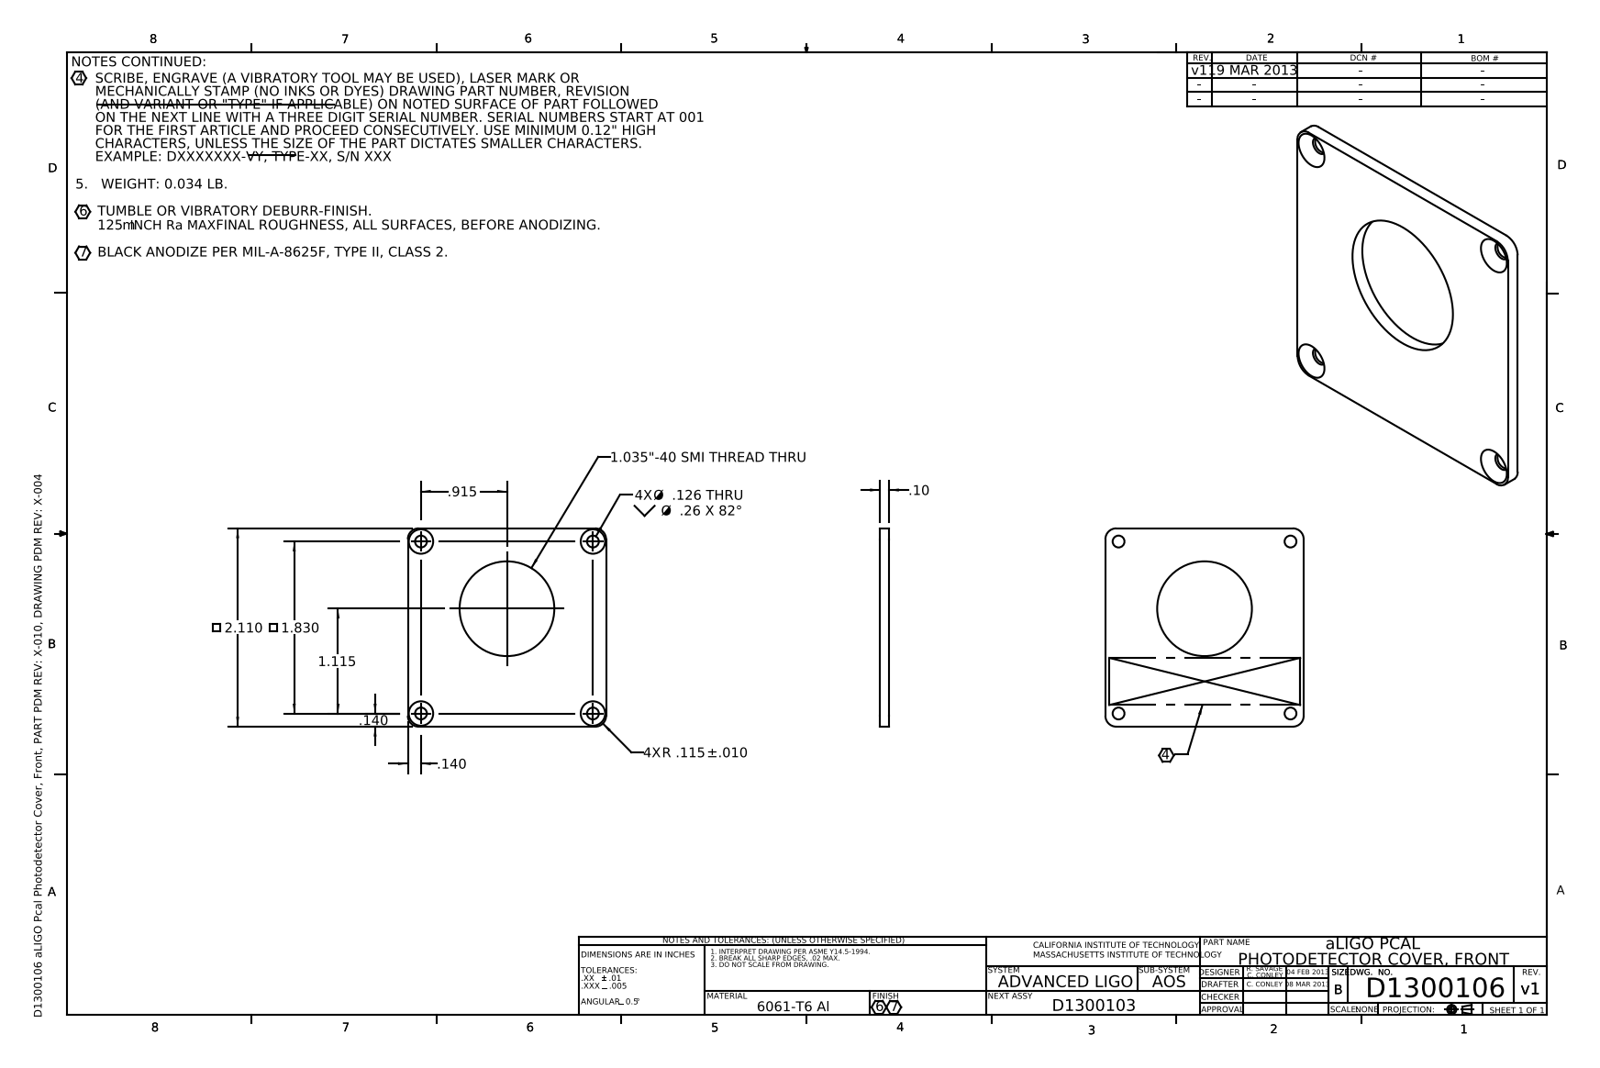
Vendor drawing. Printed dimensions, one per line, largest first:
2.110
1.830
1.115
1.035"-40 SMI THREAD THRU
.915
.140
.140
4X Ø .126 THRU Ø .26 X 82°
4X R .115 ±.010
.10
